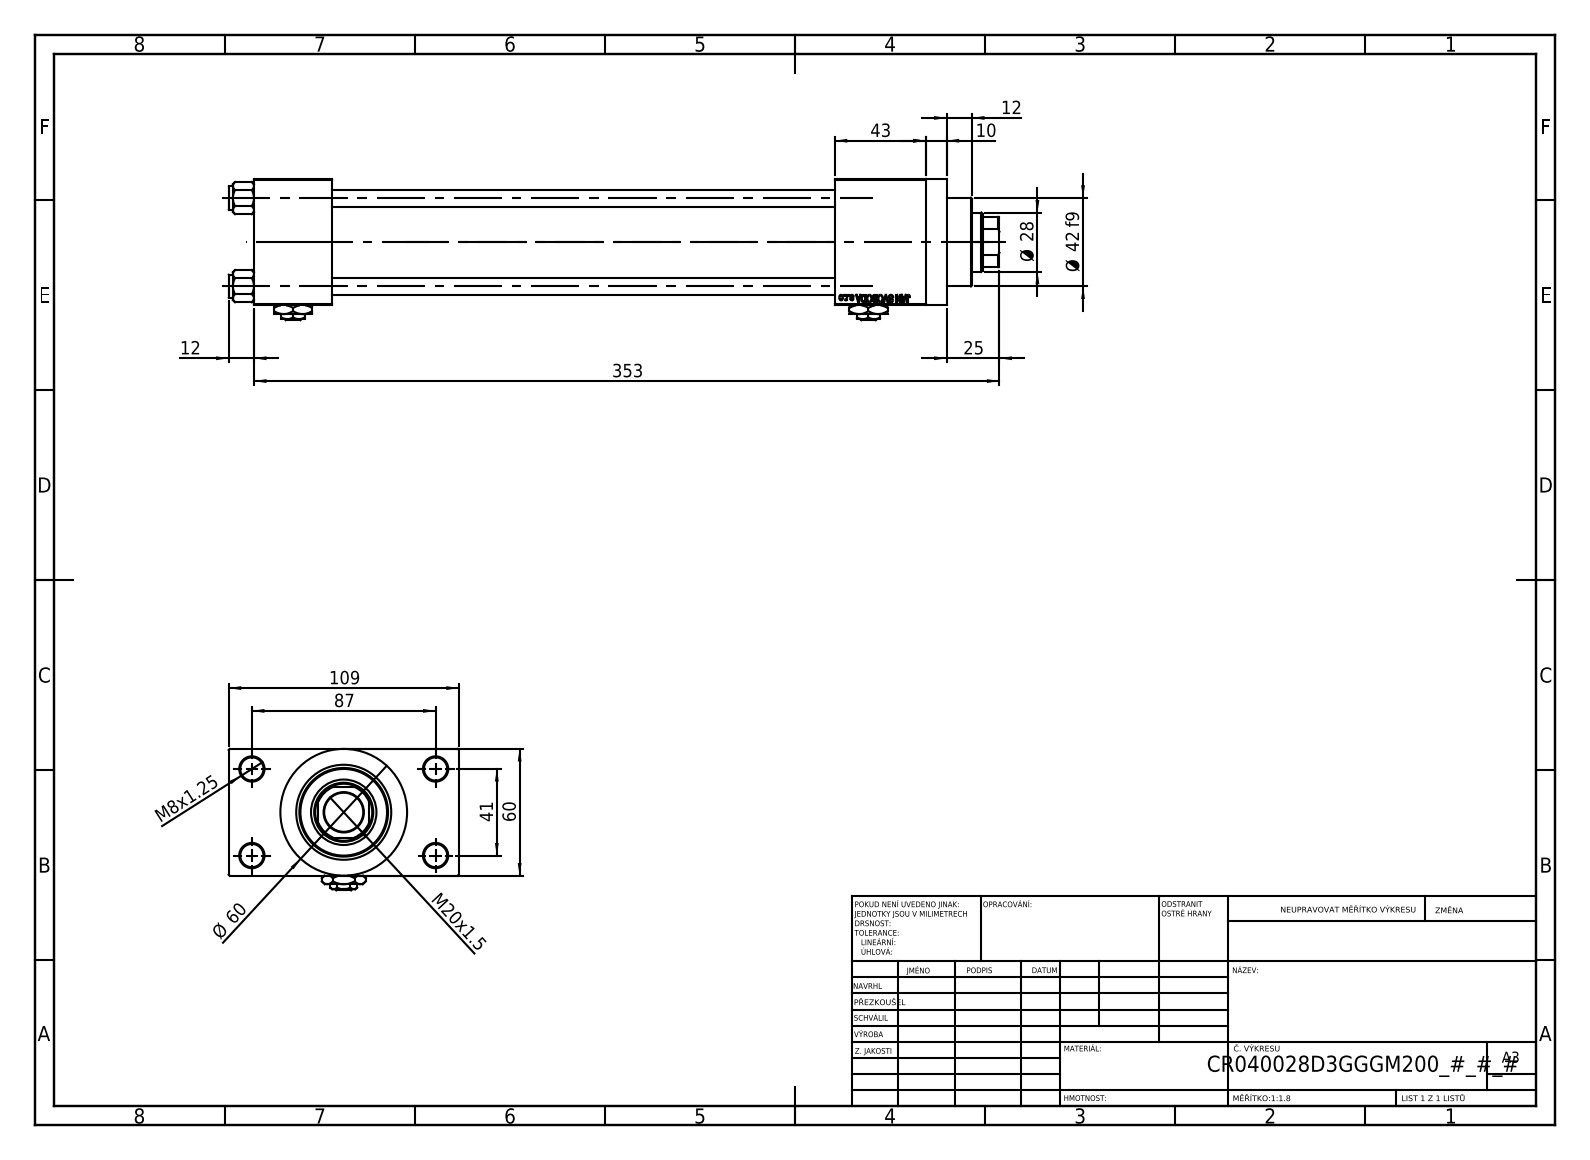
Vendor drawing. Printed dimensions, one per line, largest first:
353
109
87
Ø 60
60
43
Ø 42 f9
41
Ø 28
25
M20x1.5
12
12
10
M8x1.25
